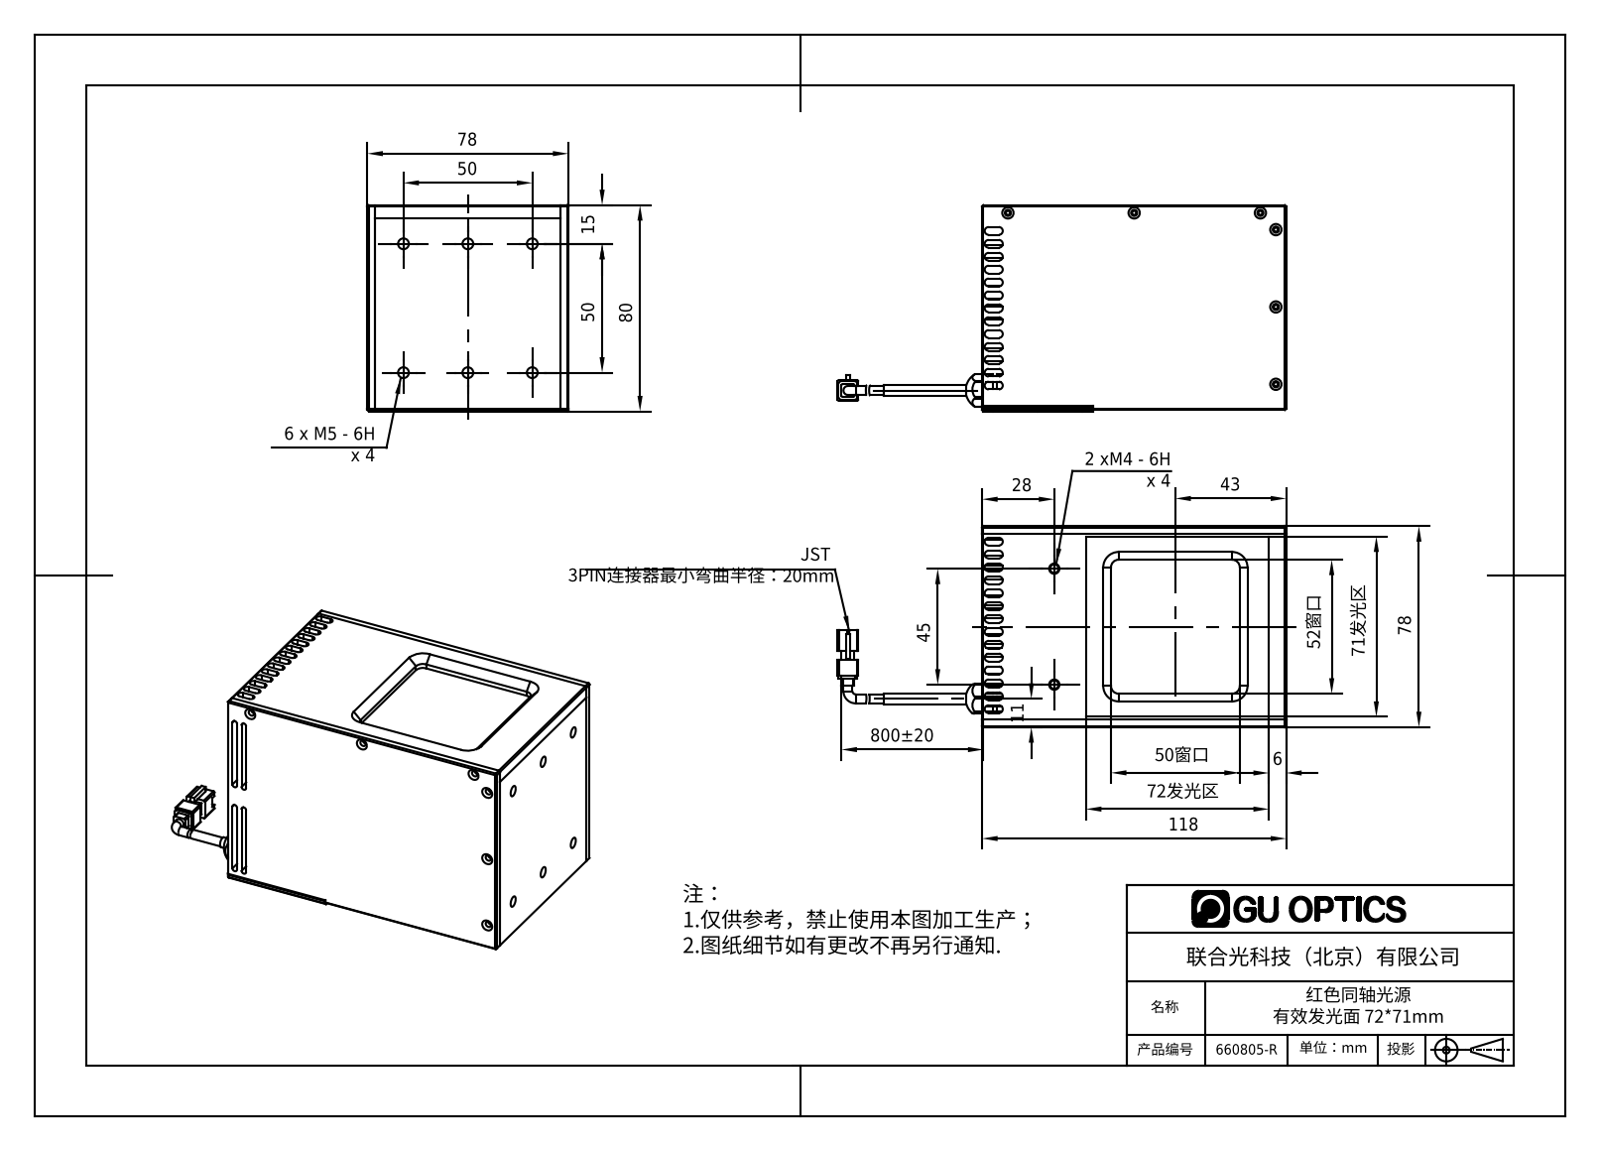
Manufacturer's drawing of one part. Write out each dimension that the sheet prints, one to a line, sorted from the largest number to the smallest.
800±20
118
80
78
78
72发光区
71发光区
52窗口
50
50
50窗口
45
43
28
15
11
6
